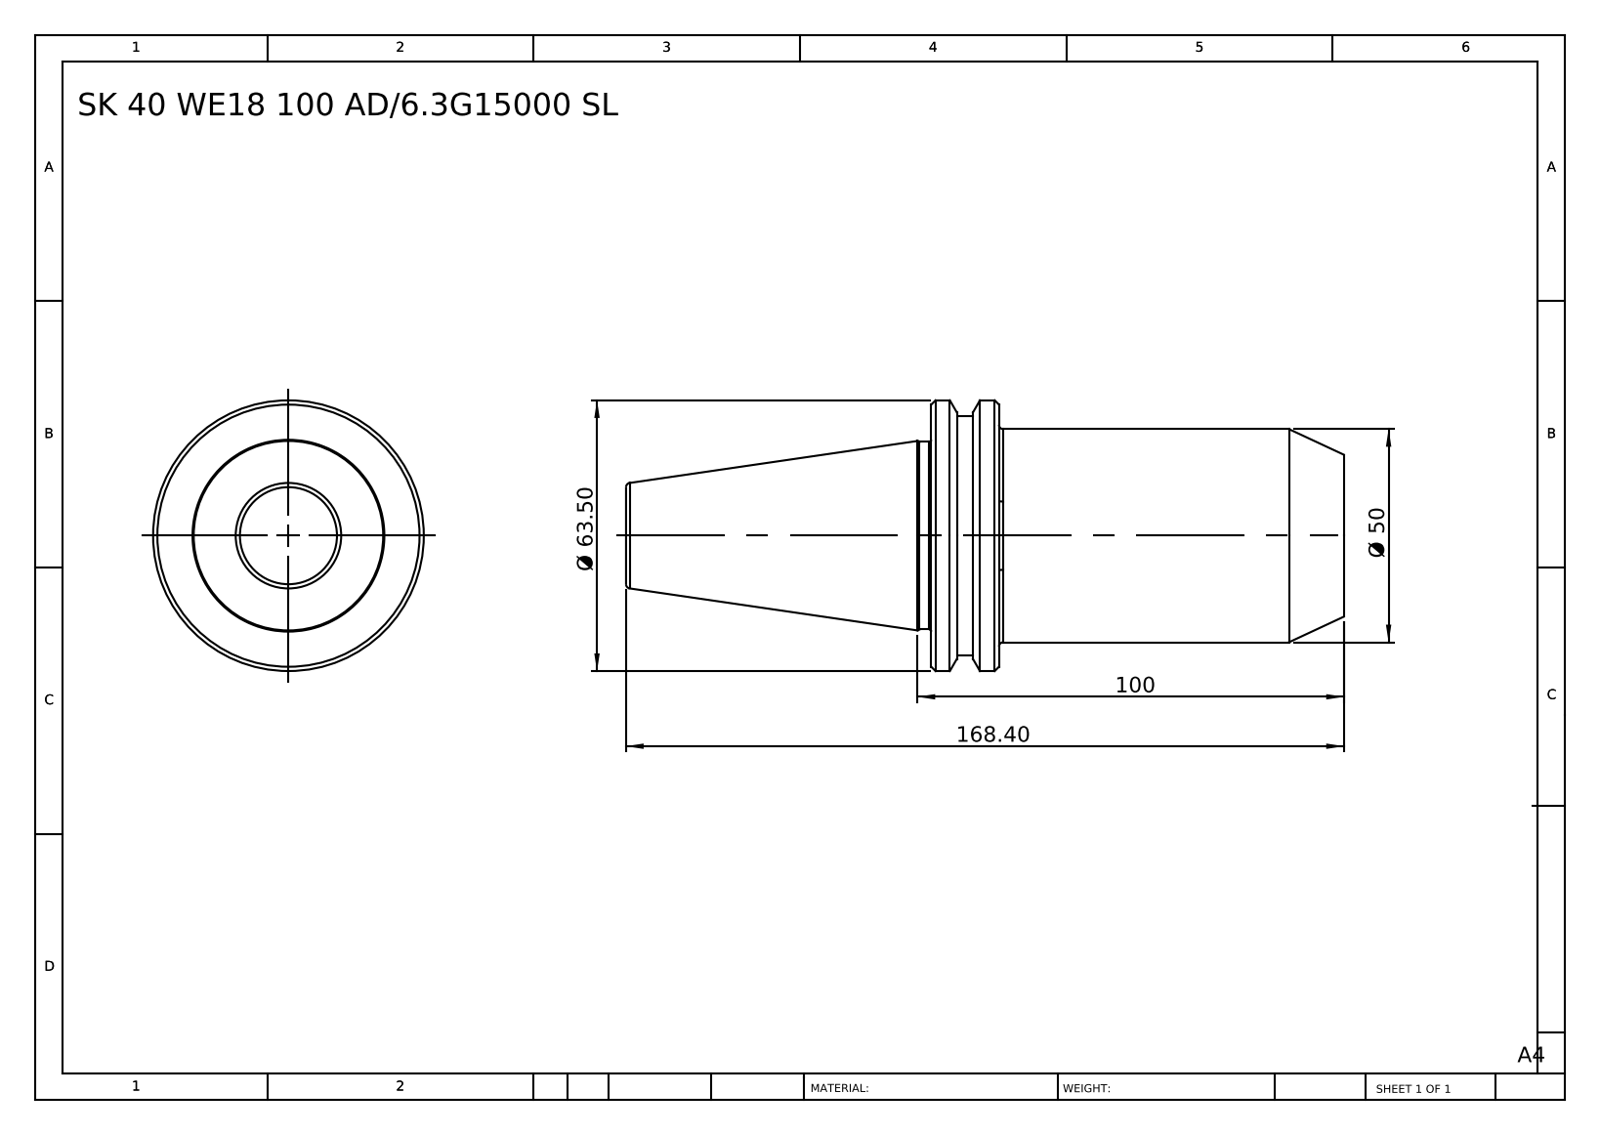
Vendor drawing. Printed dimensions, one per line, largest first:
168.40
100
Ø 63.50
Ø 50
